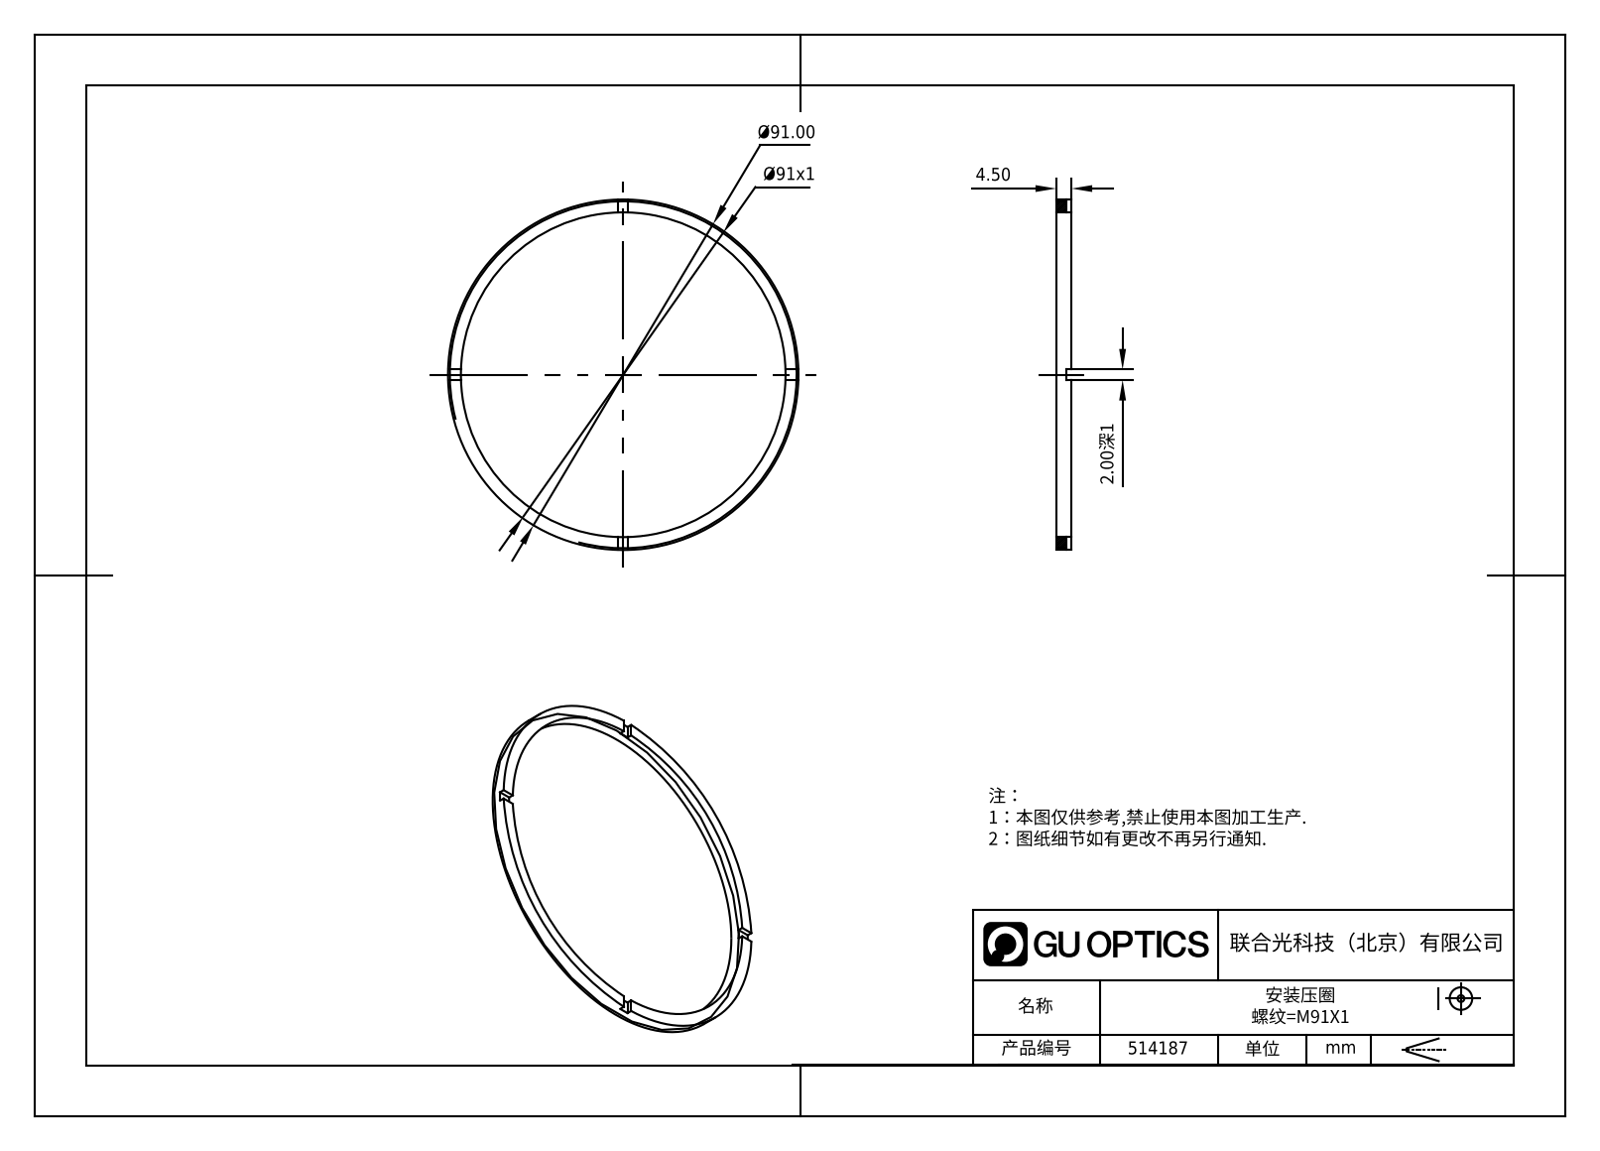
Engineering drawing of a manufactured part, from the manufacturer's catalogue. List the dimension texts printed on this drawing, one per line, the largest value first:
Ø91.00
Ø91x1
4.50
2.00深1
